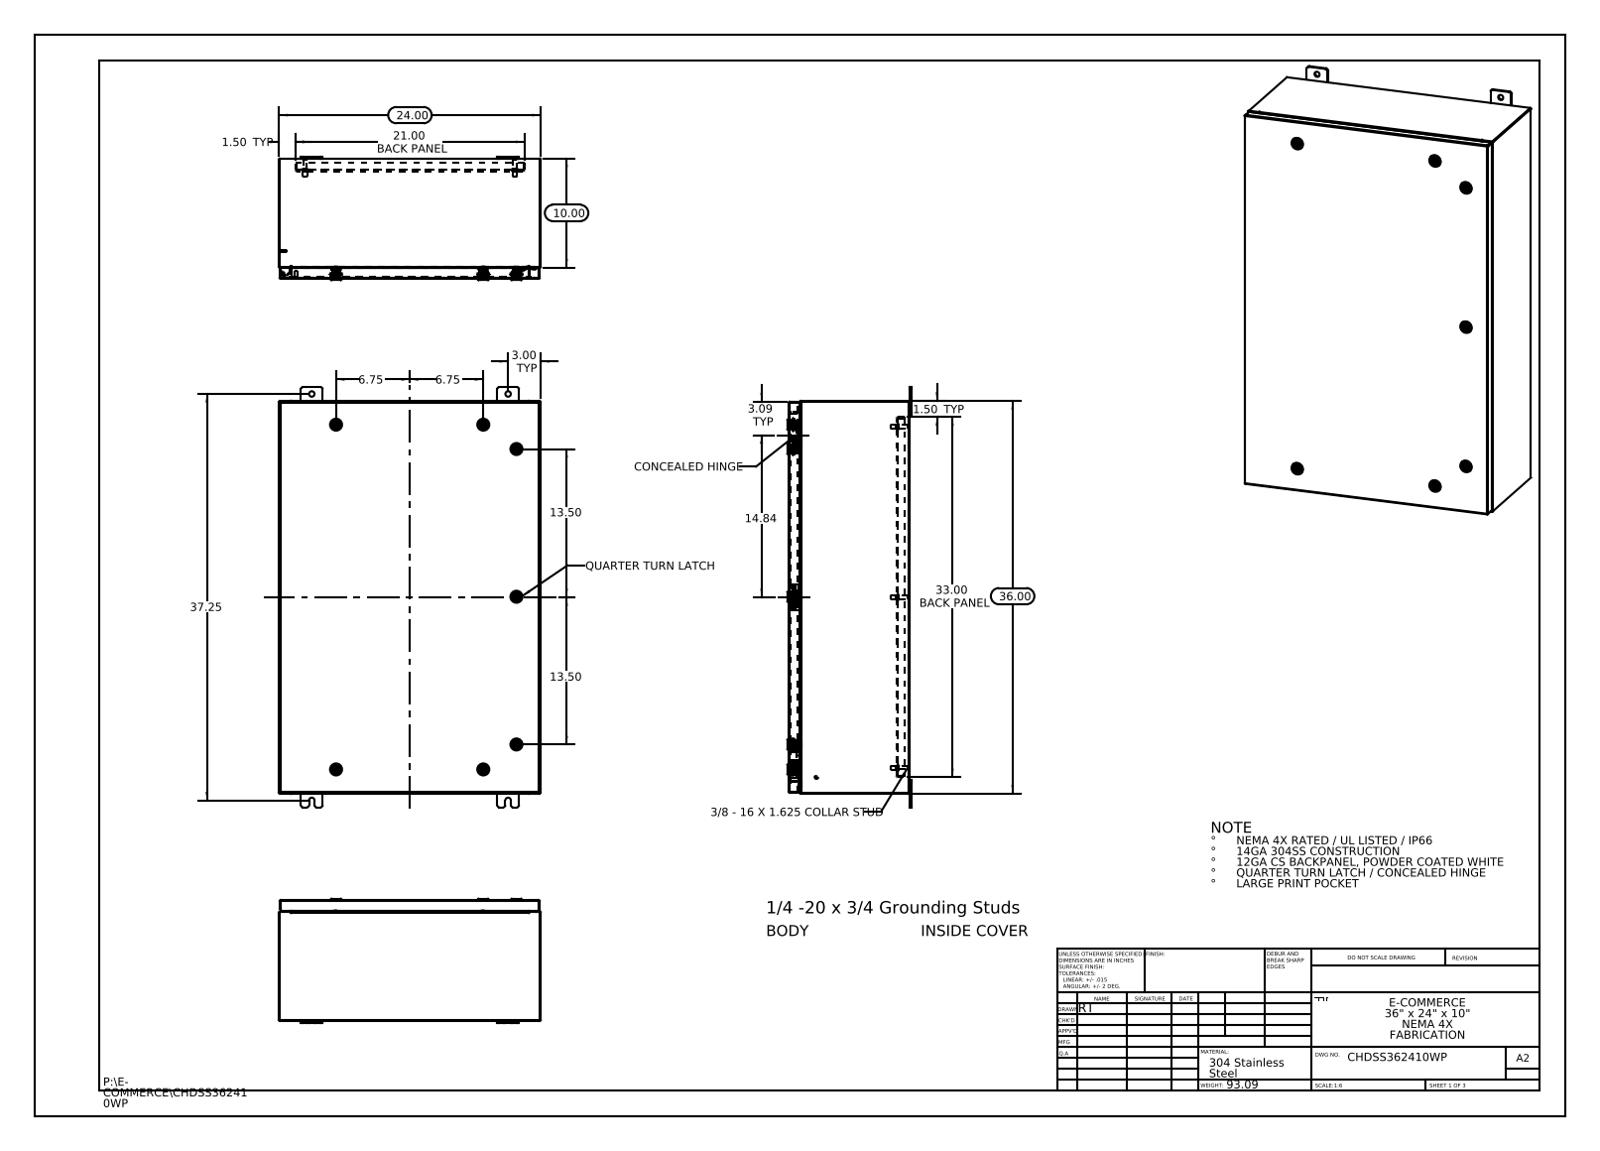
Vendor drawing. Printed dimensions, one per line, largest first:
37.25
36.00
33.00 BACK PANEL
24.00
21.00 BACK PANEL
14.84
13.50
13.50
10.00
6.75
6.75
3.09 TYP
3.00 TYP
1.50 TYP
1.50 TYP
